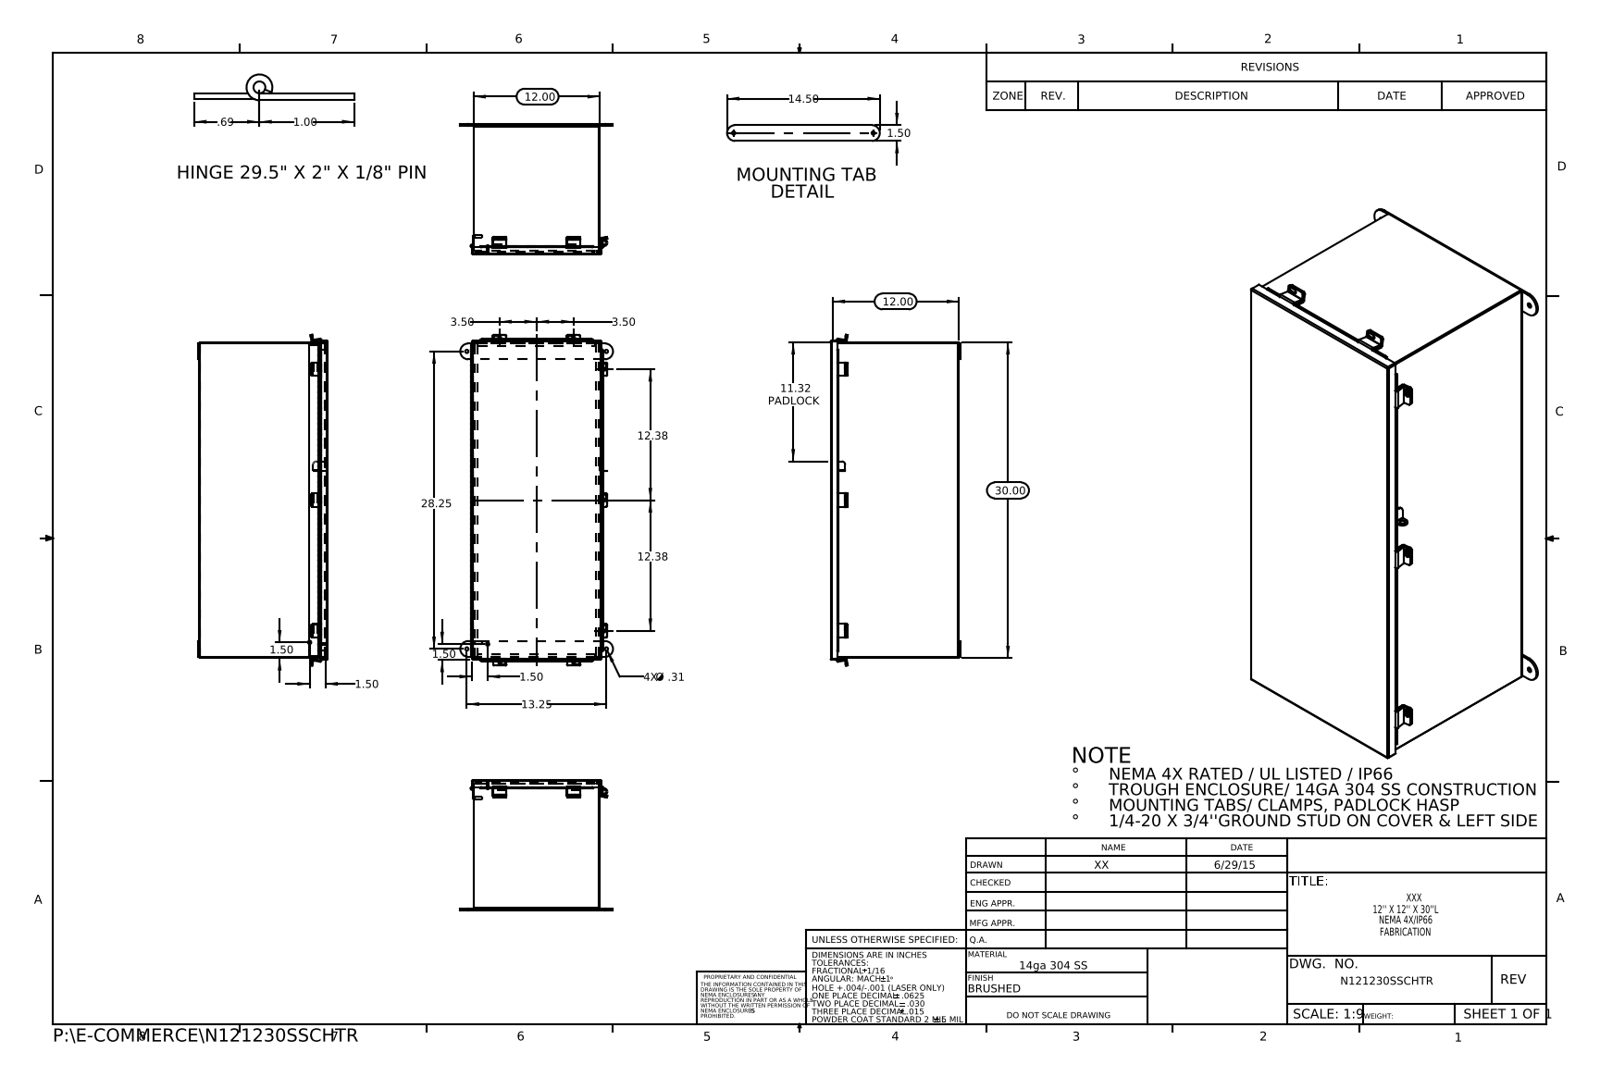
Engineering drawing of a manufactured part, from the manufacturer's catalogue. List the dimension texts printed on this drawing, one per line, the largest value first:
30.00
28.25
14.50
13.25
12.38
12.38
12.00
12.00
11.32 PADLOCK
3.50
3.50
1.50
1.50
1.50
1.50
1.50
1.00
.69
4X Ø .31
